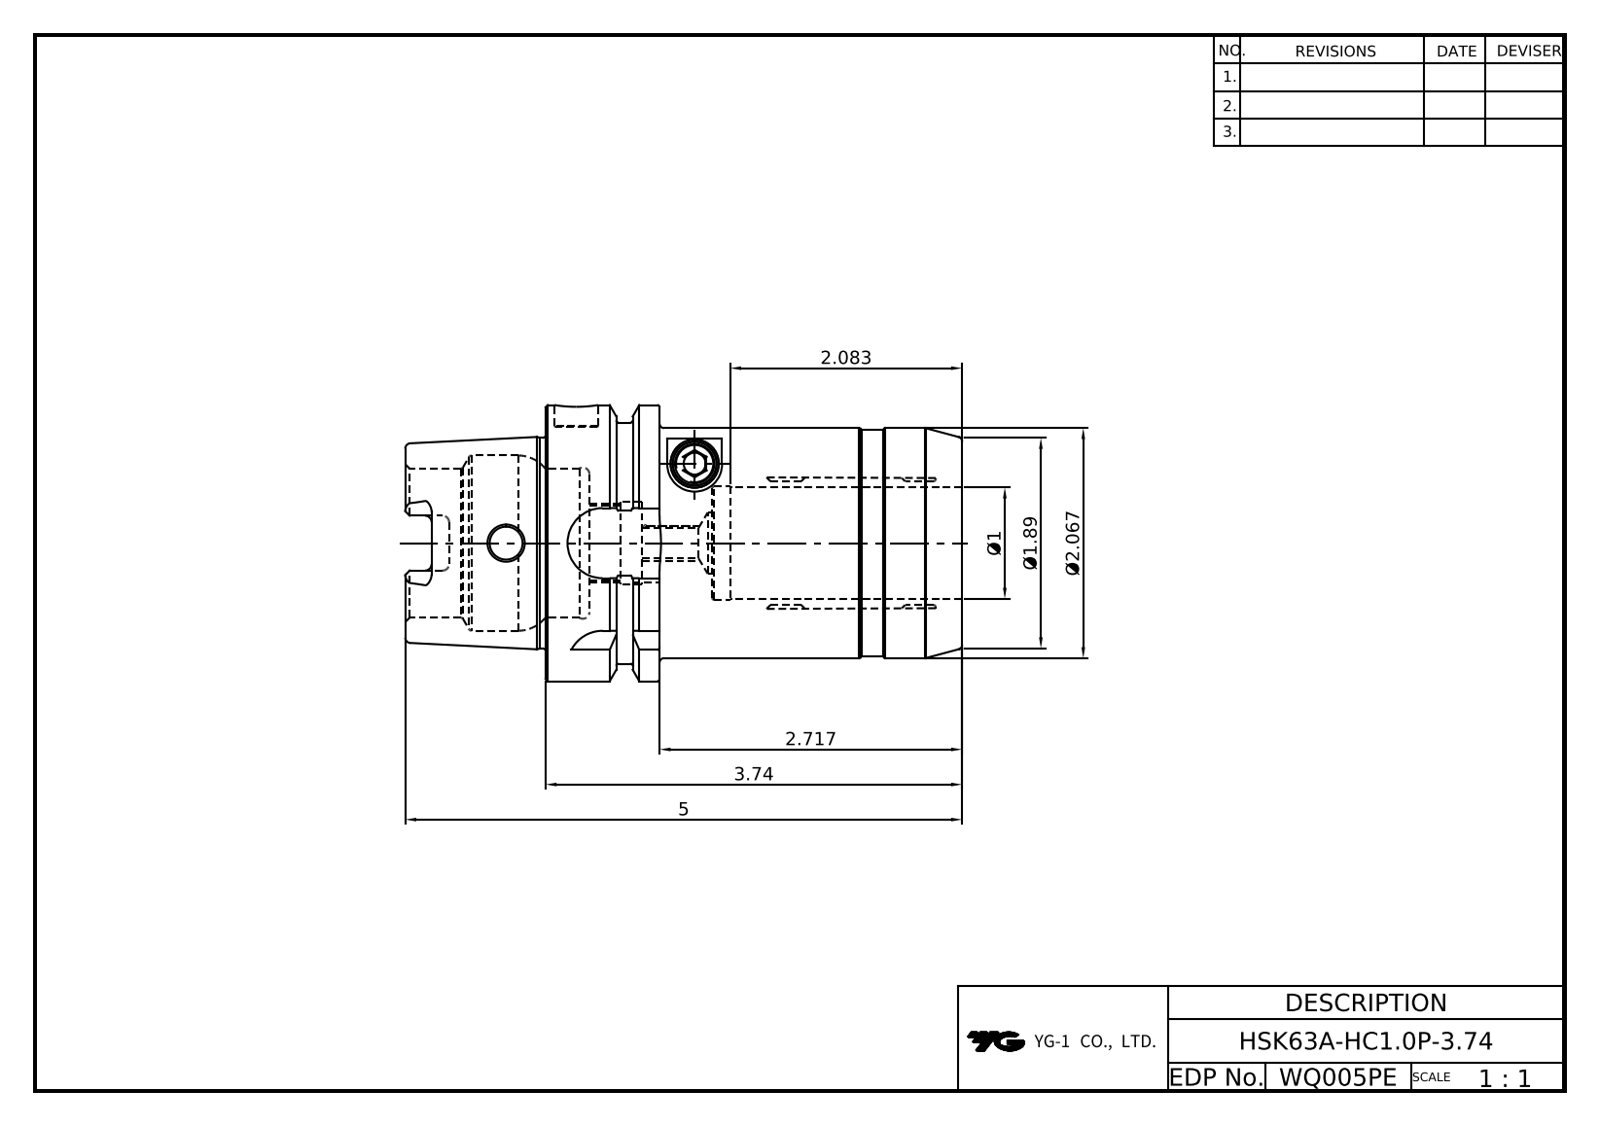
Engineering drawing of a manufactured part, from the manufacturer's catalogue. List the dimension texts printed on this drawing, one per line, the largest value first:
5
3.74
2.717
2.083
Ø2.067
Ø1.89
Ø1
